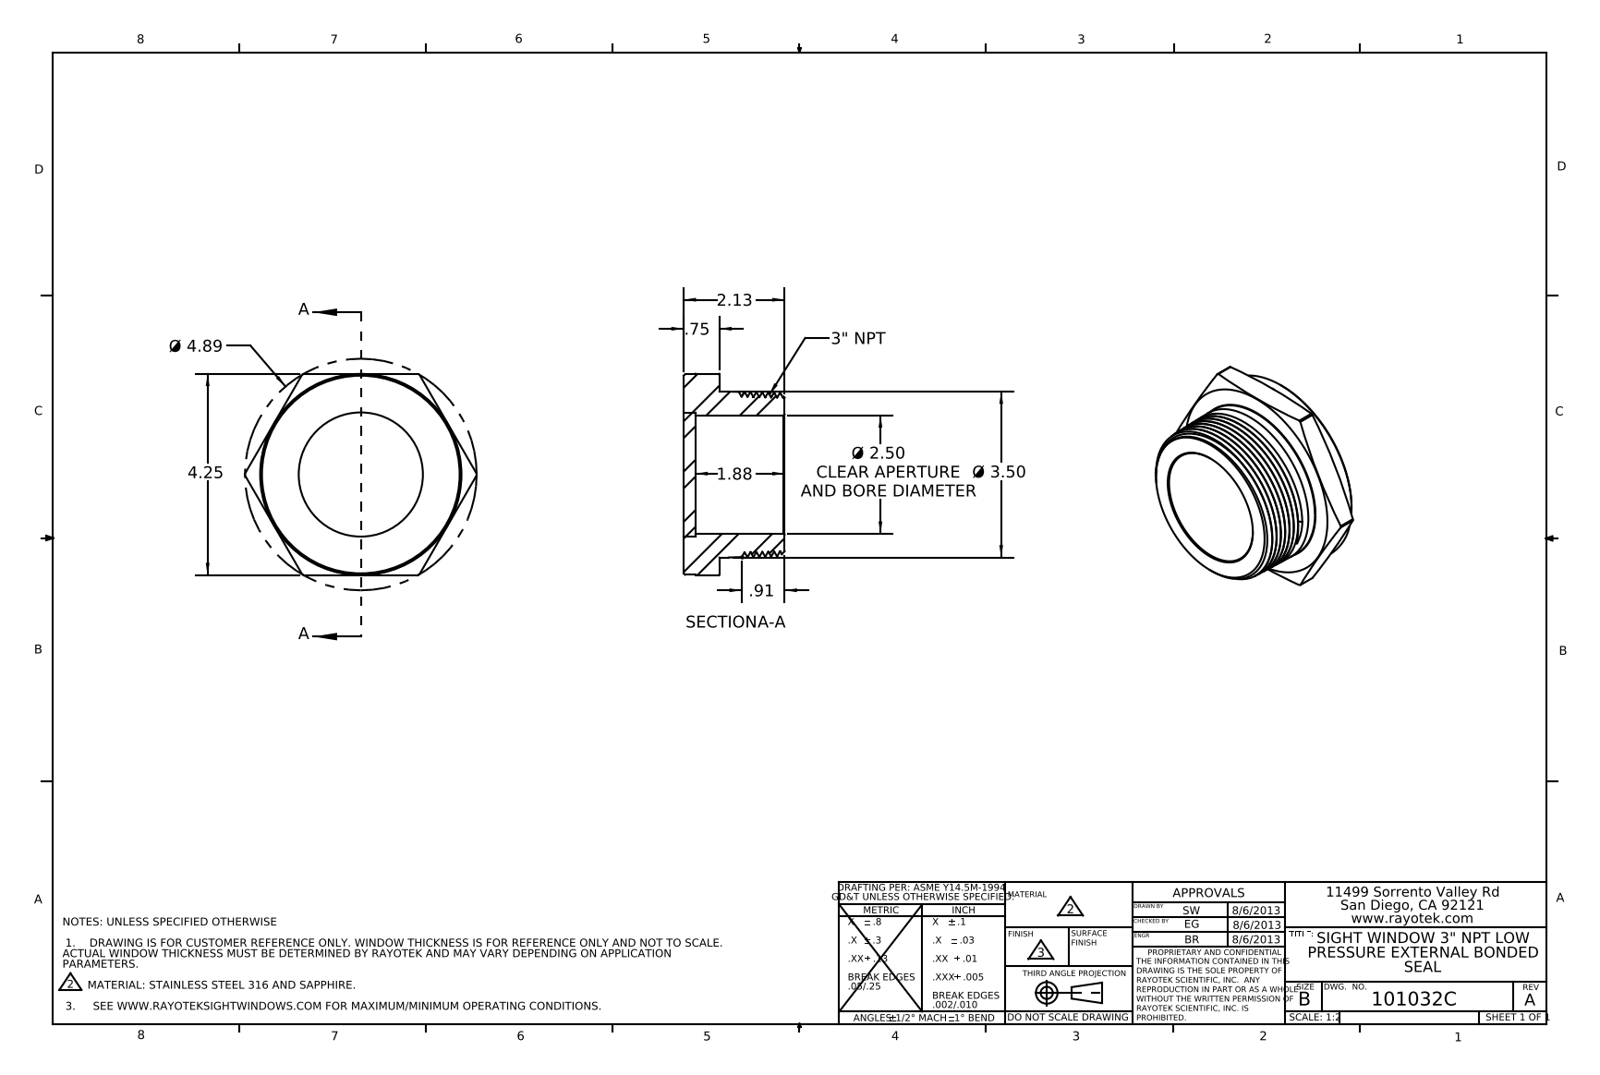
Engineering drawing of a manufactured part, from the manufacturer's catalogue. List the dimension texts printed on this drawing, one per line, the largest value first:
Ø 4.89
4.25
Ø 3.50
Ø 2.50 CLEAR APERTURE AND BORE DIAMETER
2.13
1.88
.91
.75
